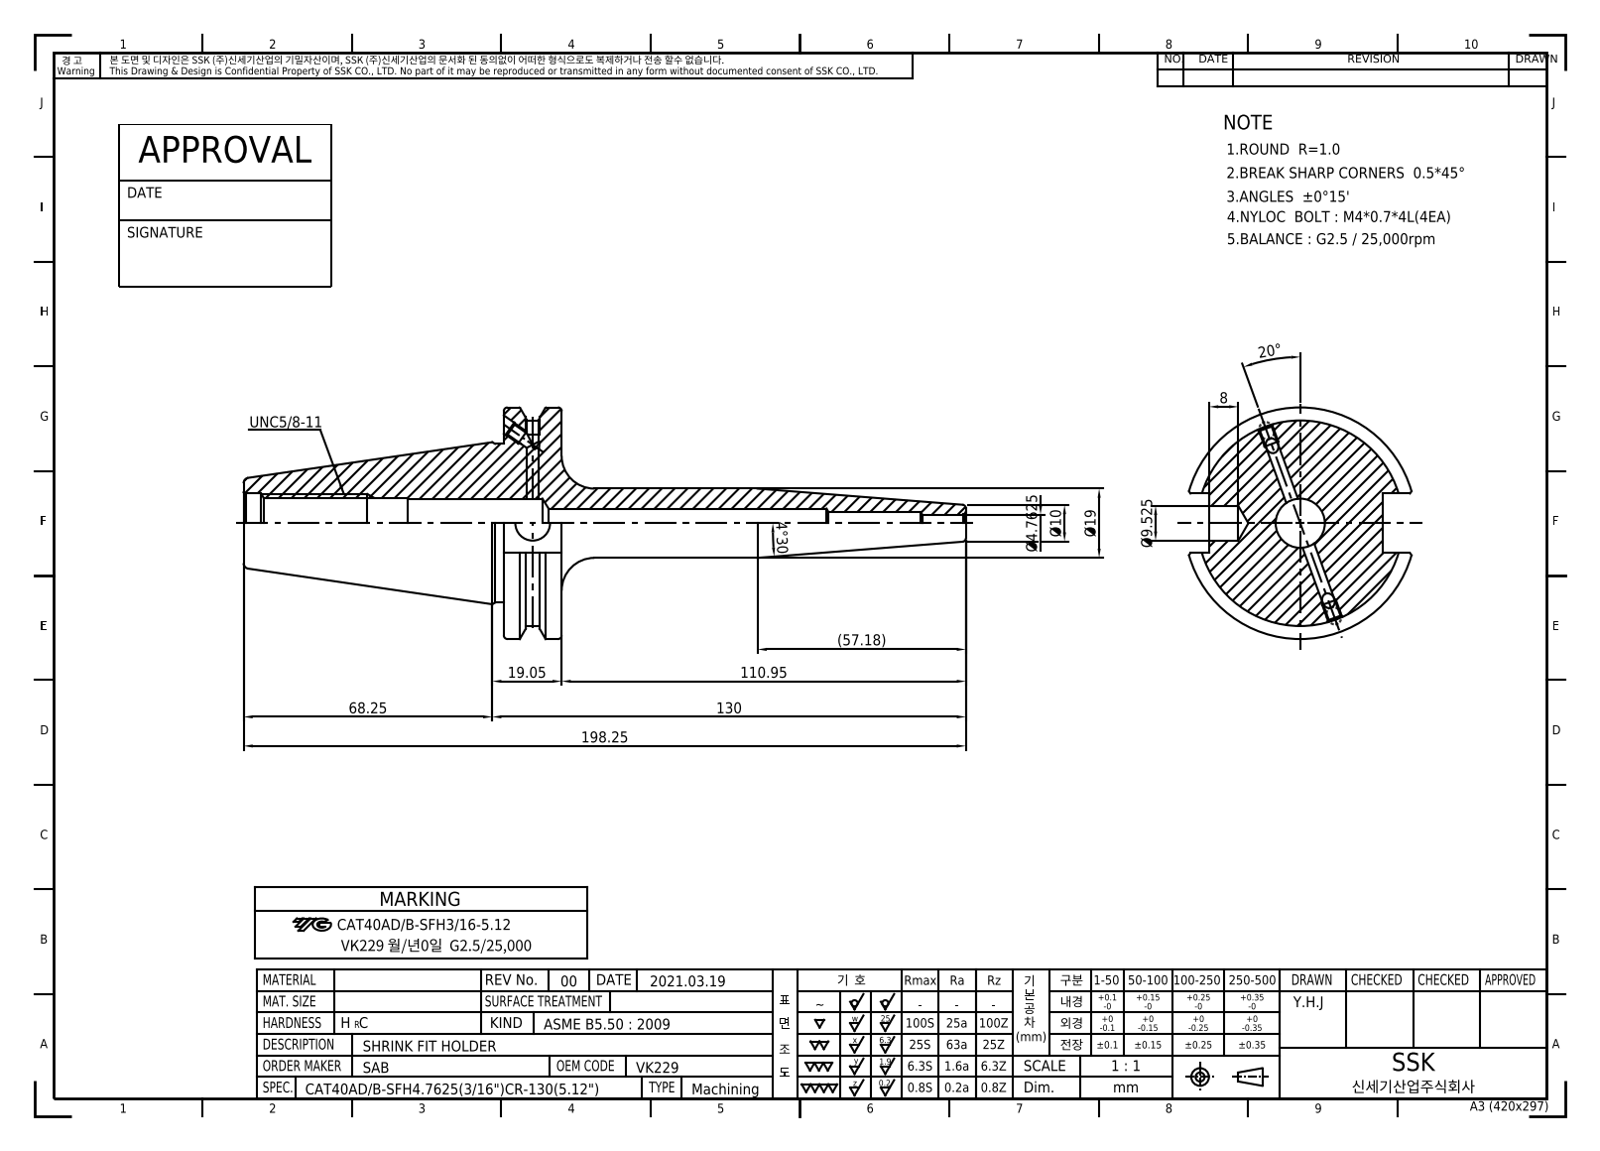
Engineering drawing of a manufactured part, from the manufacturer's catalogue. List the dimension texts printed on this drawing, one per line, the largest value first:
198.25
130
110.95
68.25
(57.18)
20°
19.05
Ø19
Ø10
Ø9.525
8
Ø4.7625
4°30'
